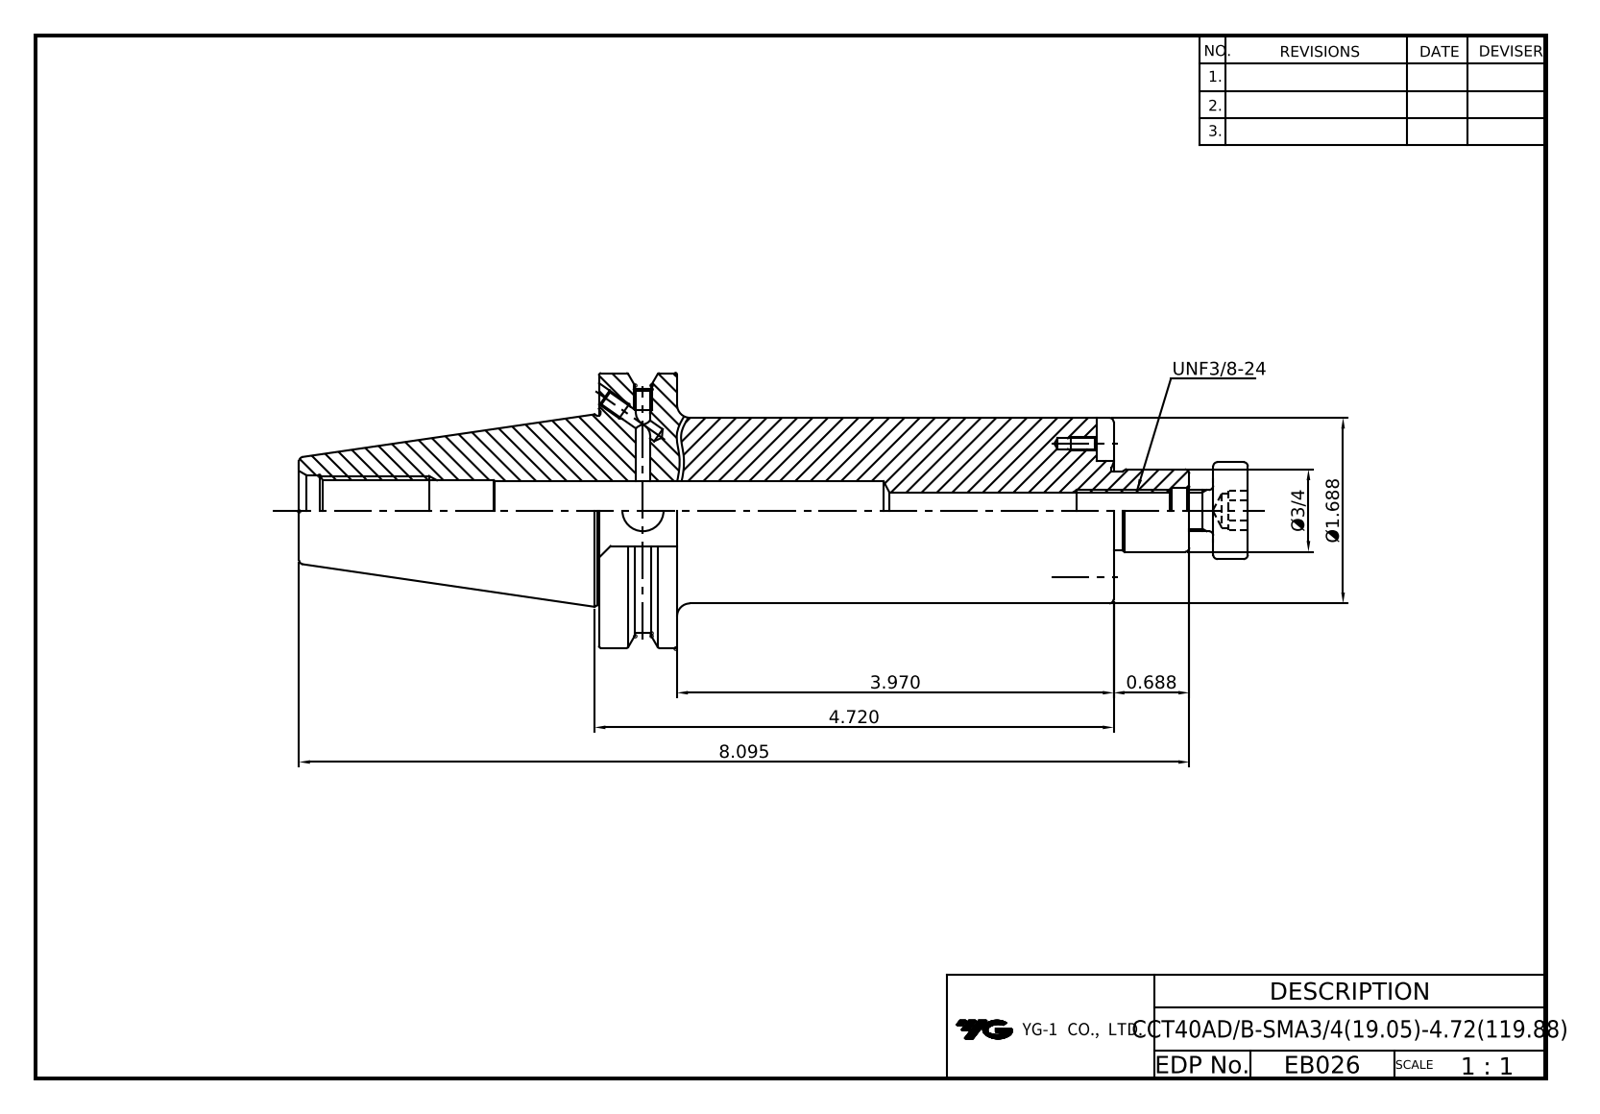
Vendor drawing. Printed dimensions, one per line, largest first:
8.095
4.720
3.970
Ø1.688
Ø3/4
0.688
